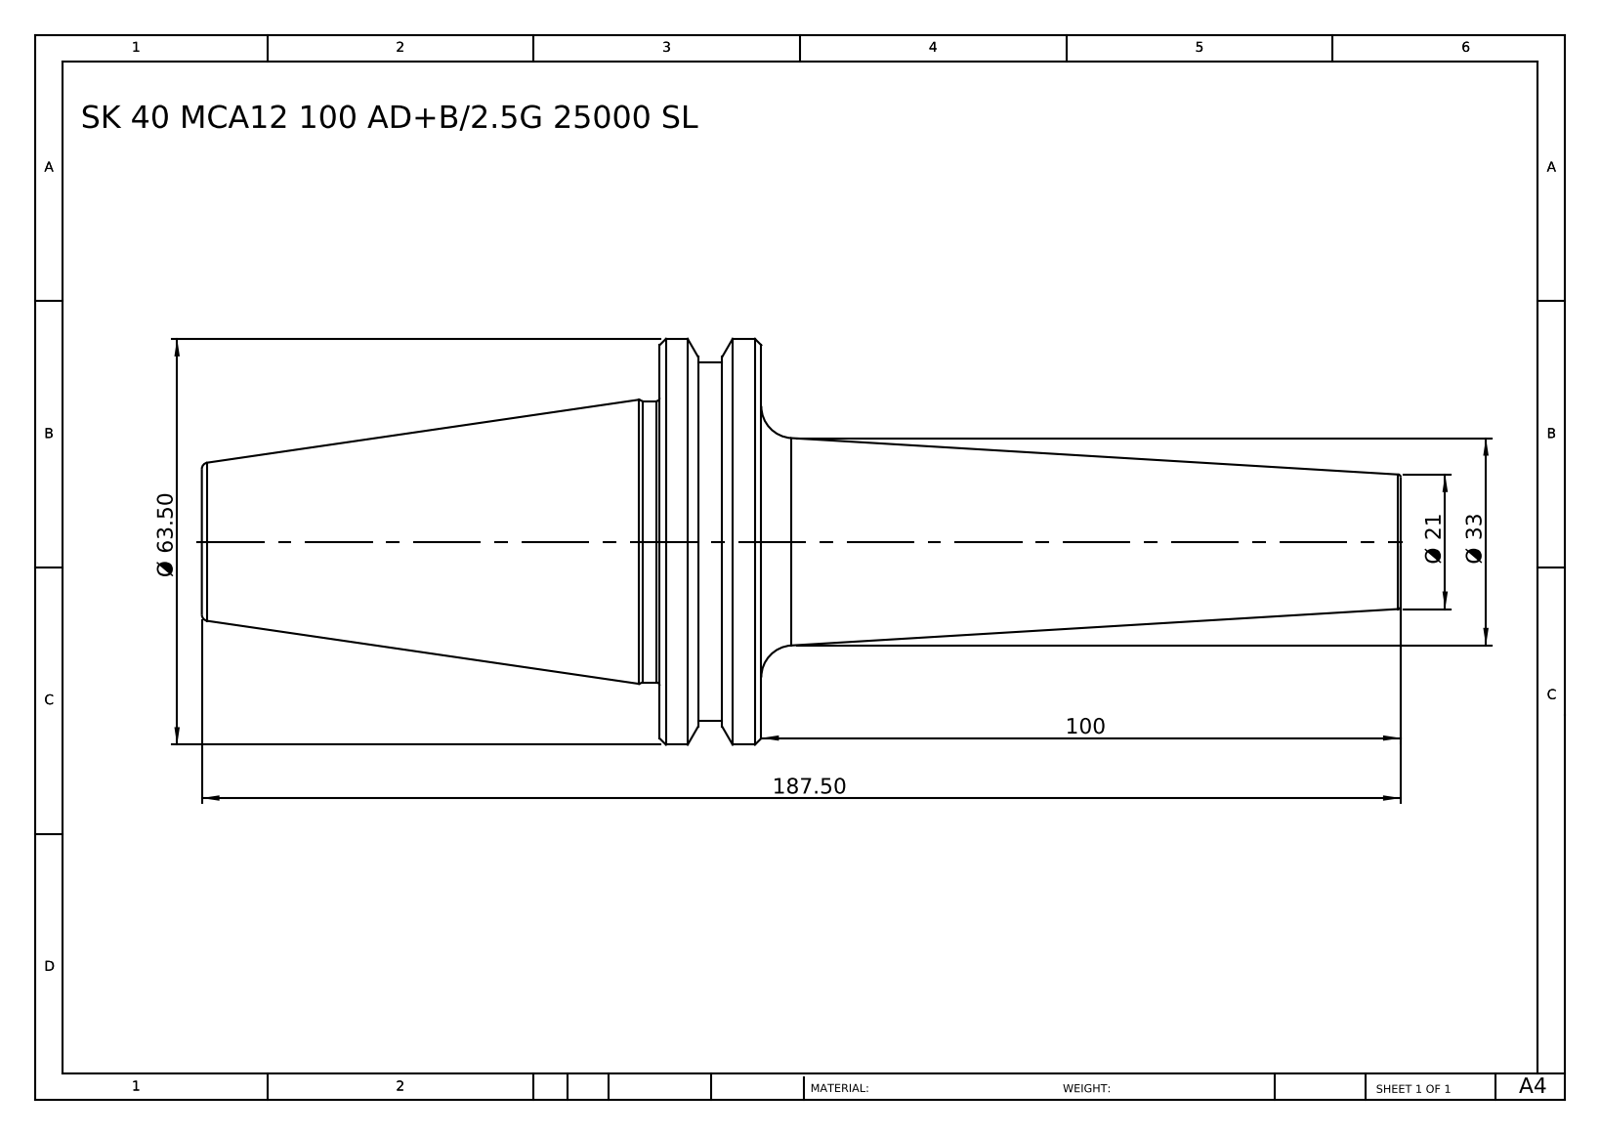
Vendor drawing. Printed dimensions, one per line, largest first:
187.50
100
Ø 63.50
Ø 33
Ø 21
